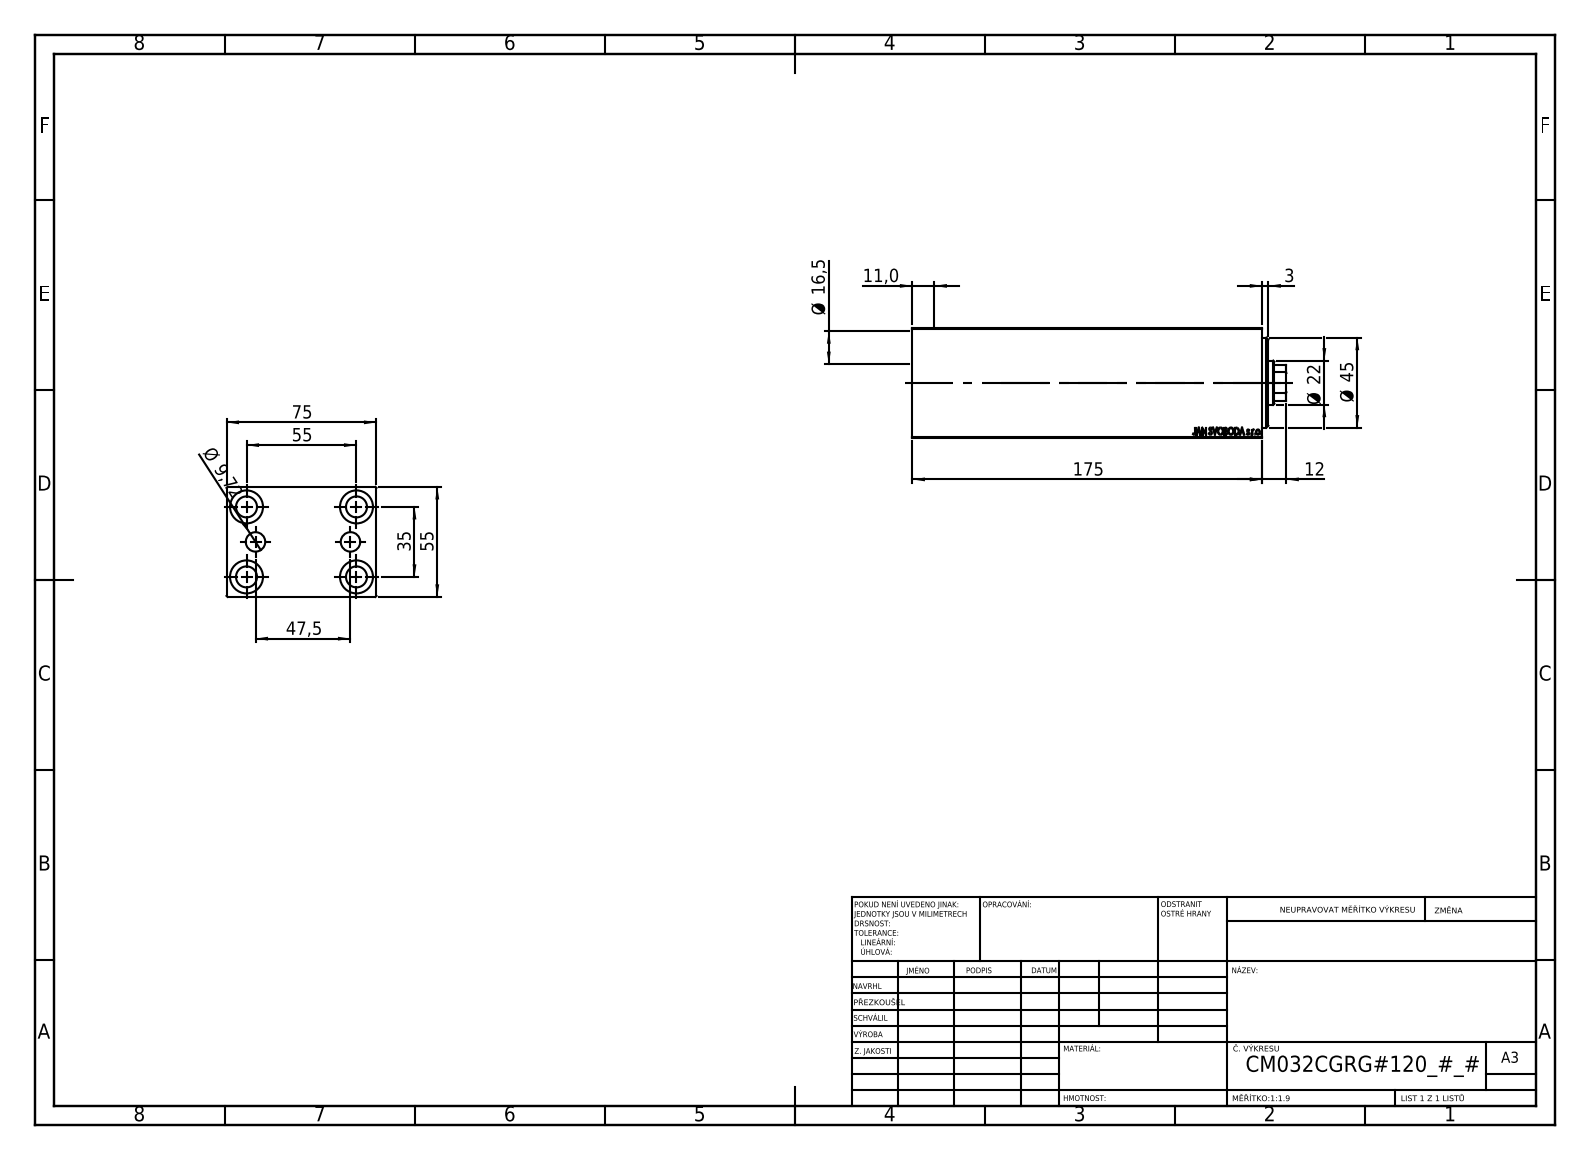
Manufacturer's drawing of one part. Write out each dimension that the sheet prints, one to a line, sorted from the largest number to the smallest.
175
75
55
55
47,5
Ø 45
35
Ø 22
Ø 16,5
12
11,0
Ø 9,72
3
